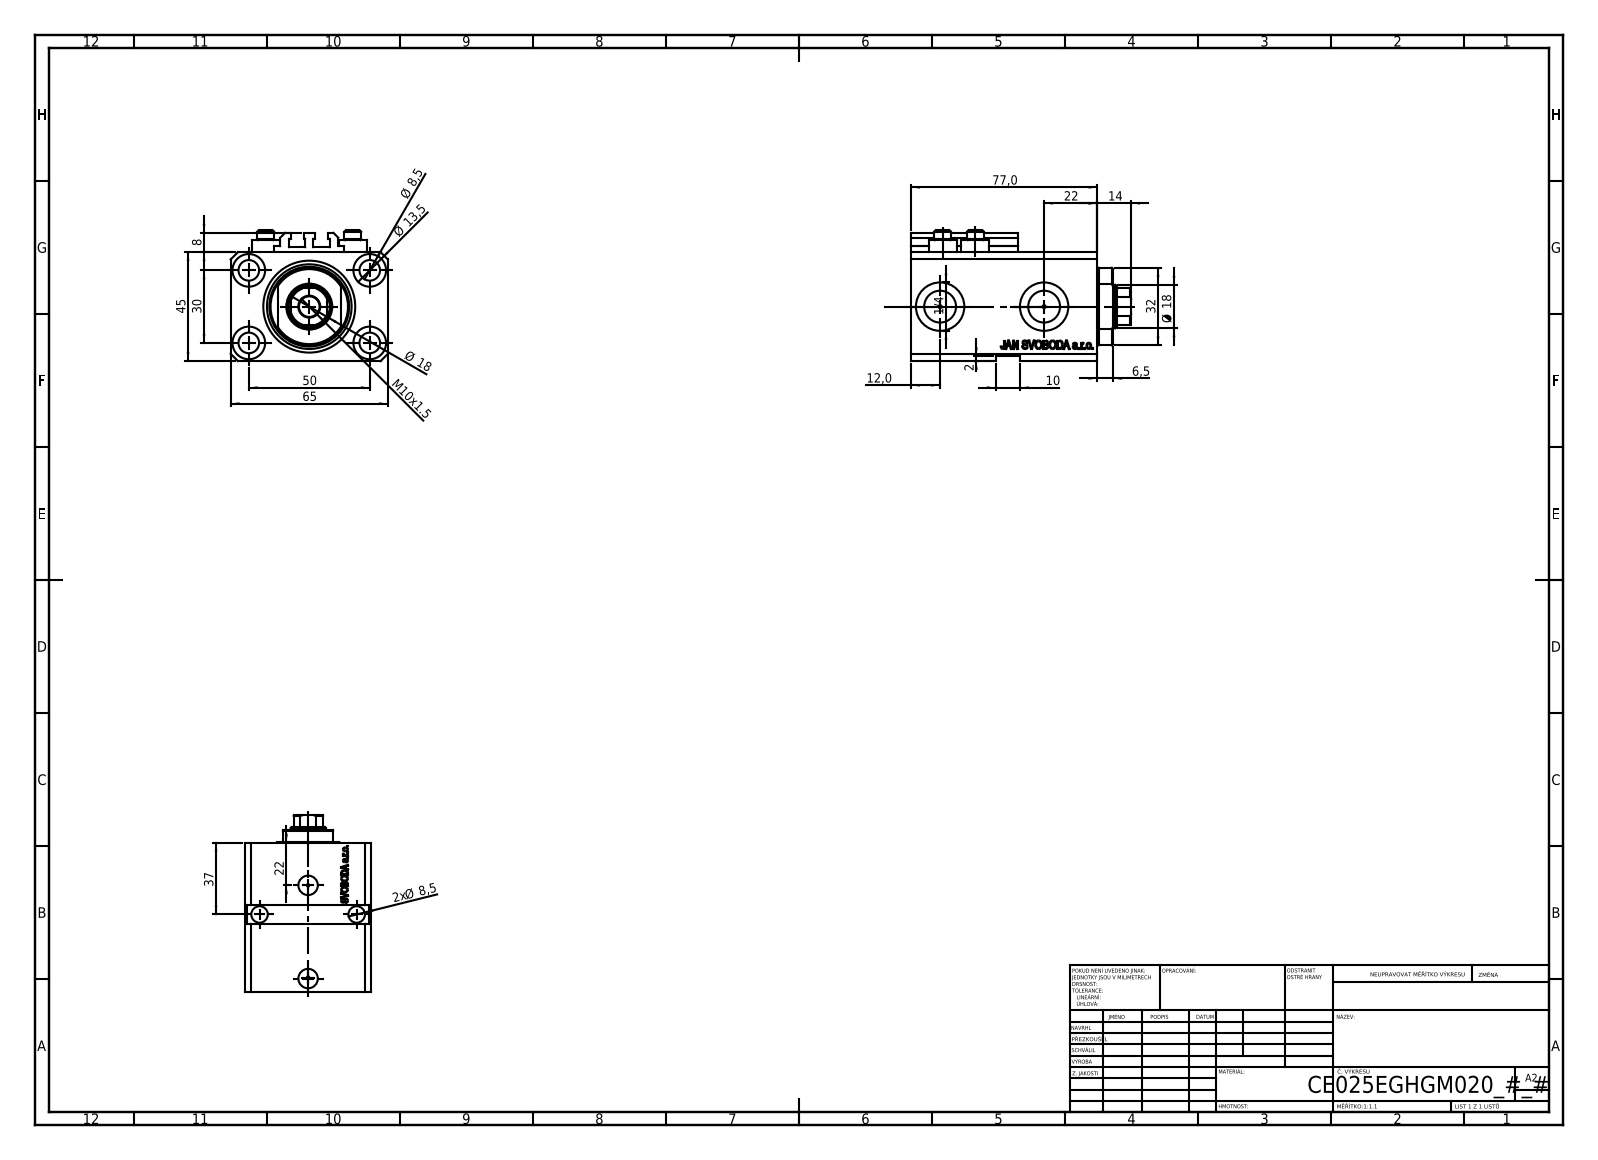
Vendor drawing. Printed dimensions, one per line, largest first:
77,0
65
50
45
37
32
30
22
22
Ø 18
Ø 18
14
Ø 13,5
12,0
M10x1.5
10
Ø 8,5
2x Ø 8,5
8
6,5
2
1/4
